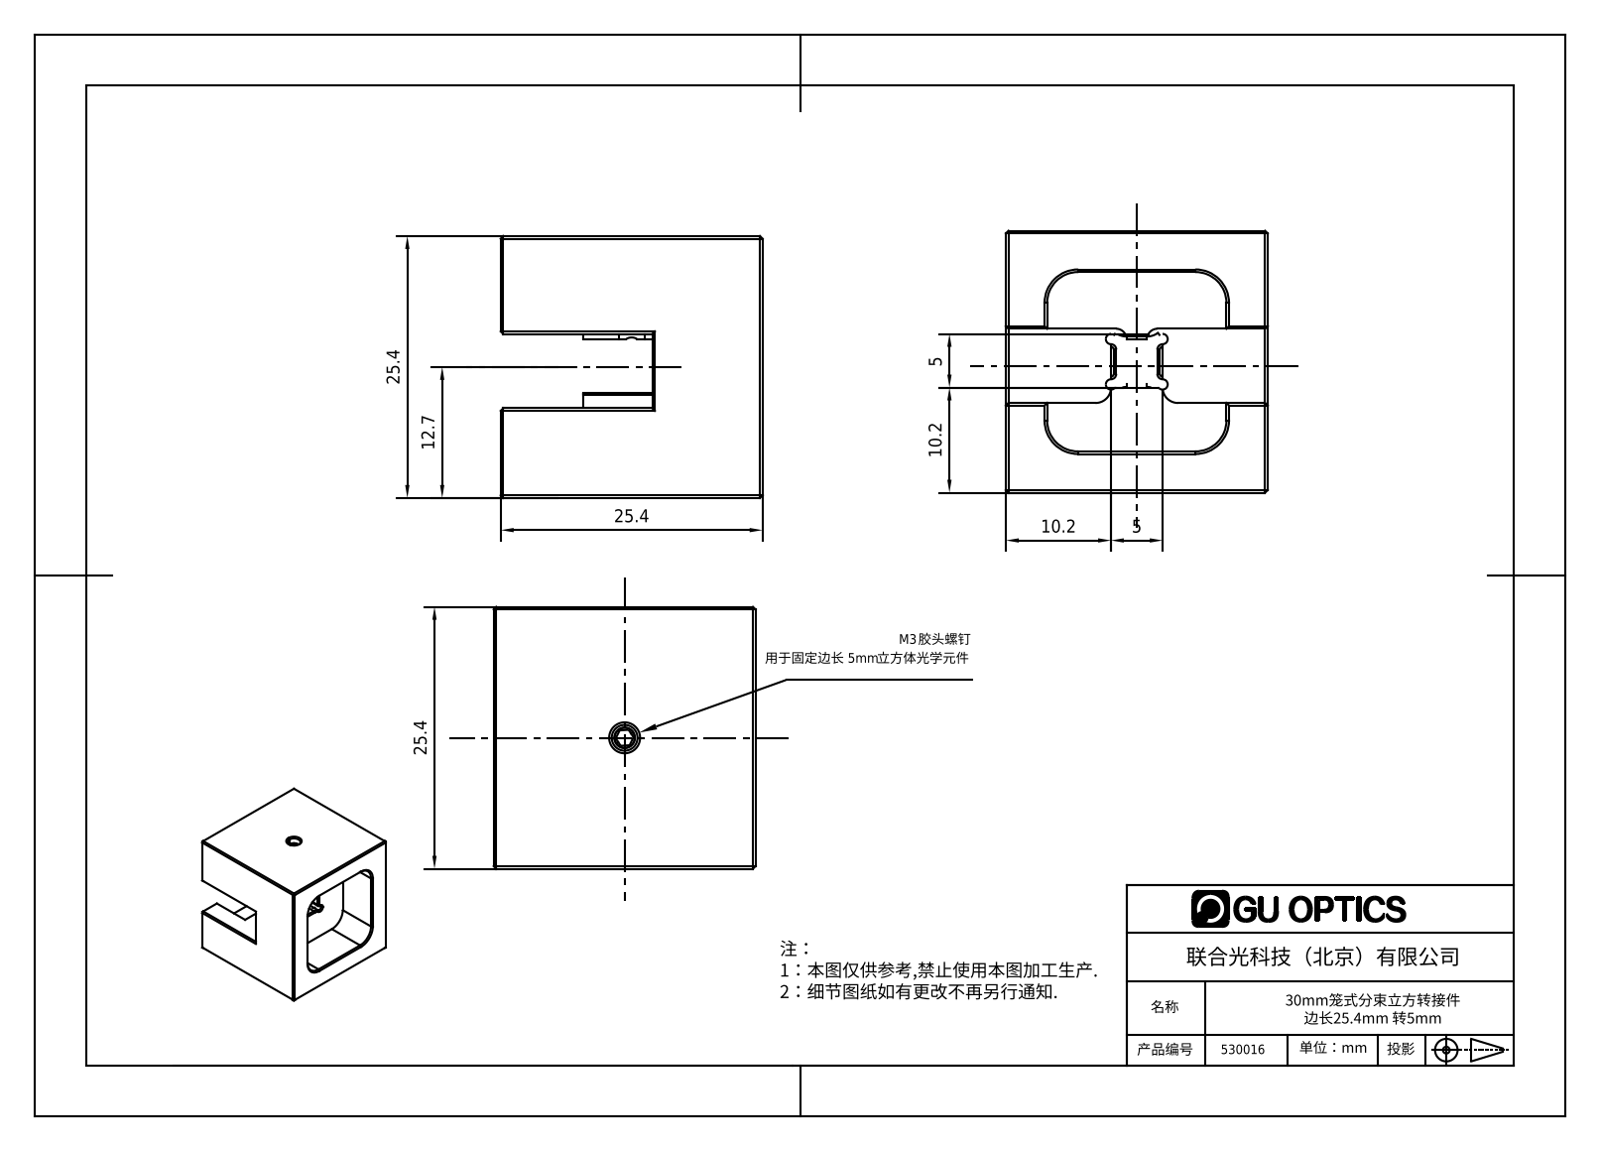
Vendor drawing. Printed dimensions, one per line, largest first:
25.4
25.4
25.4
12.7
10.2
10.2
5
5
